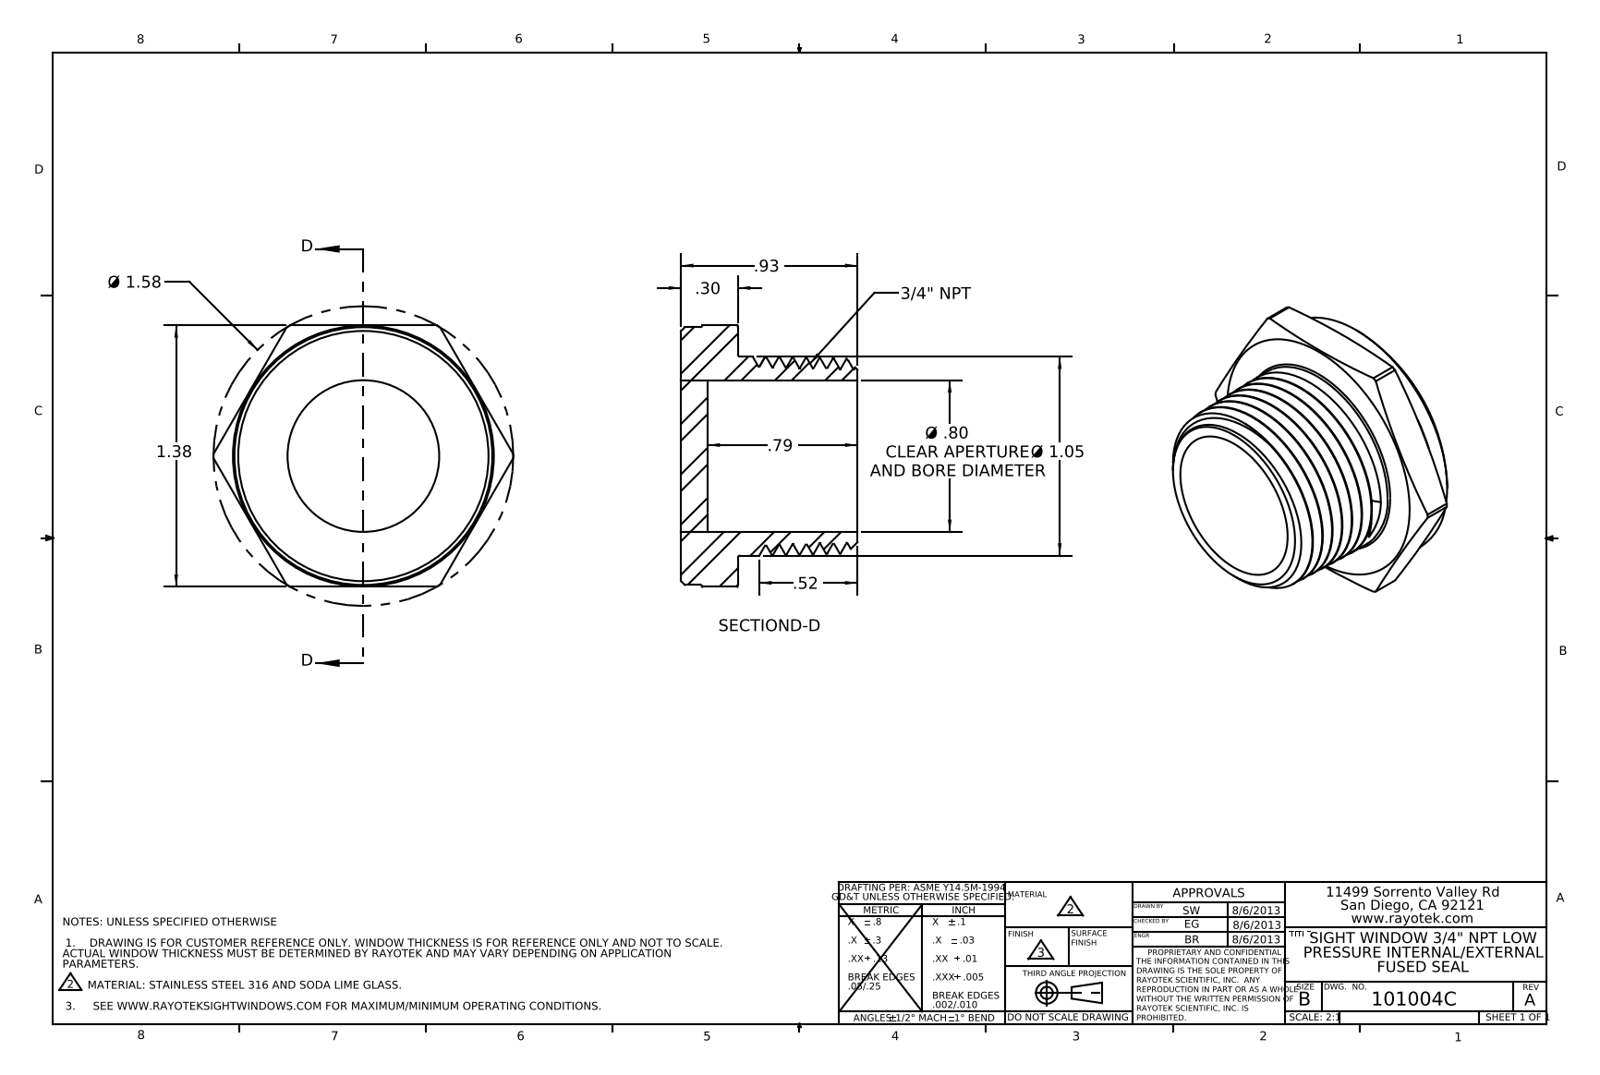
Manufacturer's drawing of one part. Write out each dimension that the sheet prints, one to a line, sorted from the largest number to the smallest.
Ø 1.58
1.38
Ø 1.05
.93
Ø .80 CLEAR APERTURE AND BORE DIAMETER
.79
.52
.30
